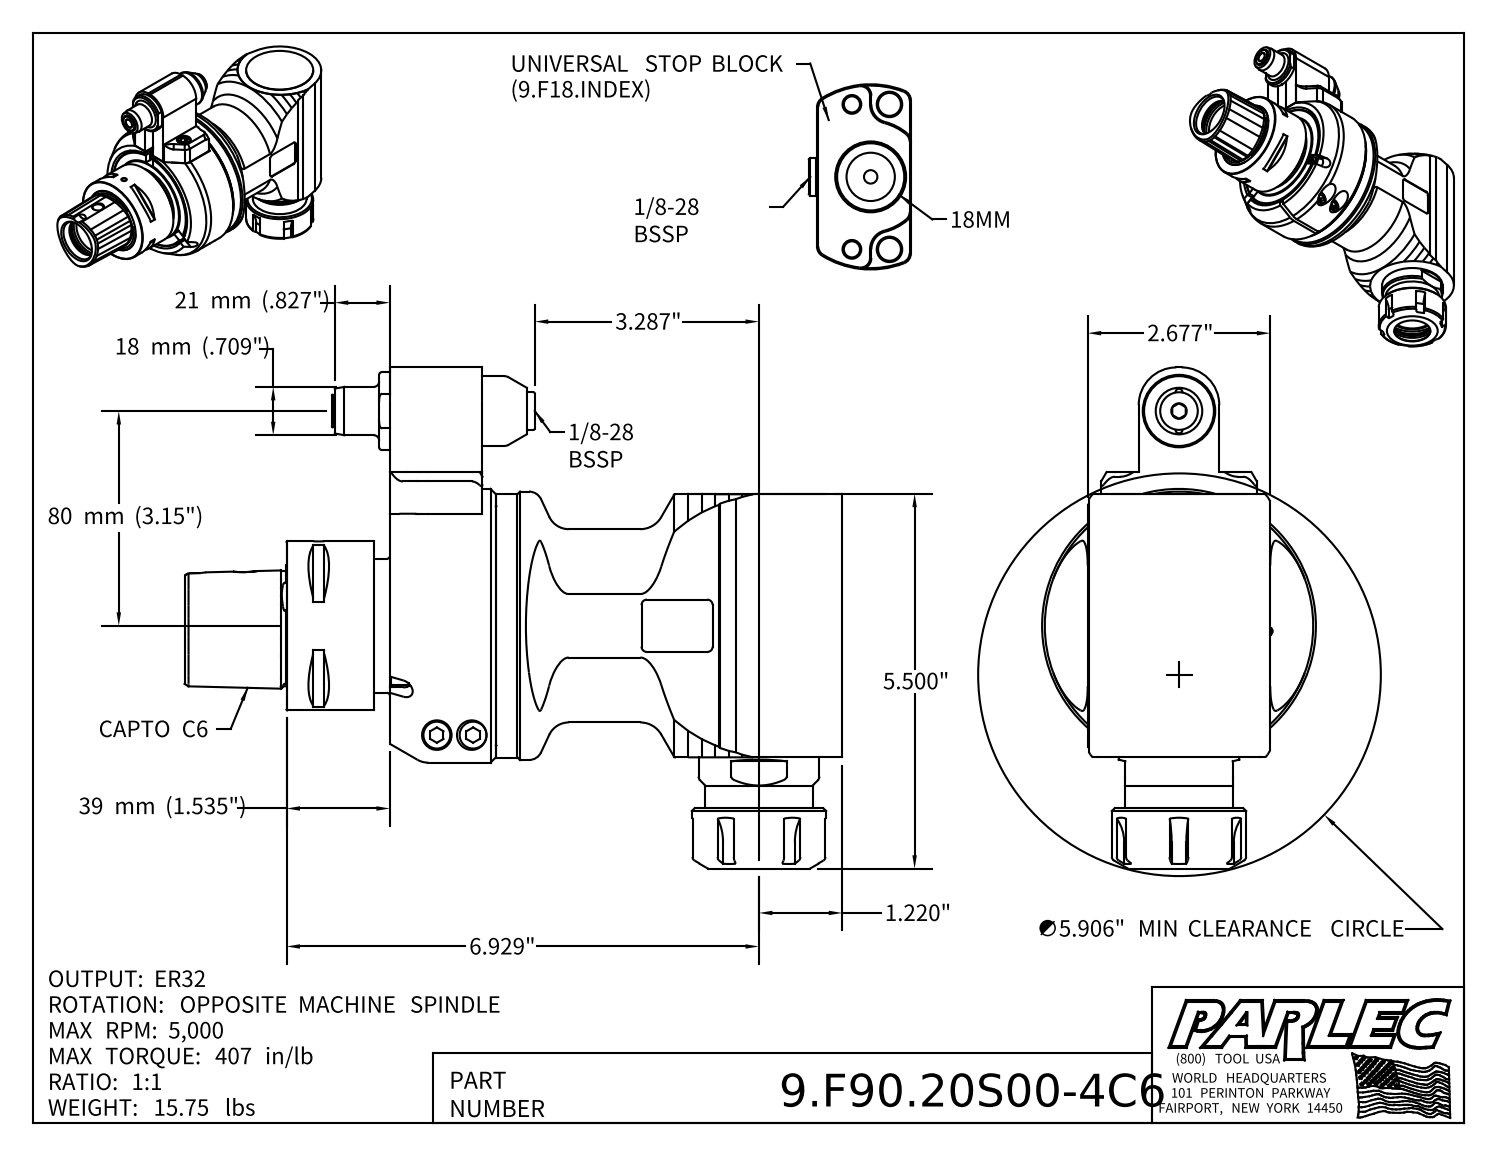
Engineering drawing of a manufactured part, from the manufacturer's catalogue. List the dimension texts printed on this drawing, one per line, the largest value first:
80 mm (3.15")
39 mm (1.535")
21 mm (.827")
18 mm (.709")
6.929"
∅5.906" MIN CLEARANCE CIRCLE
5.500"
3.287"
2.677"
1.220"
